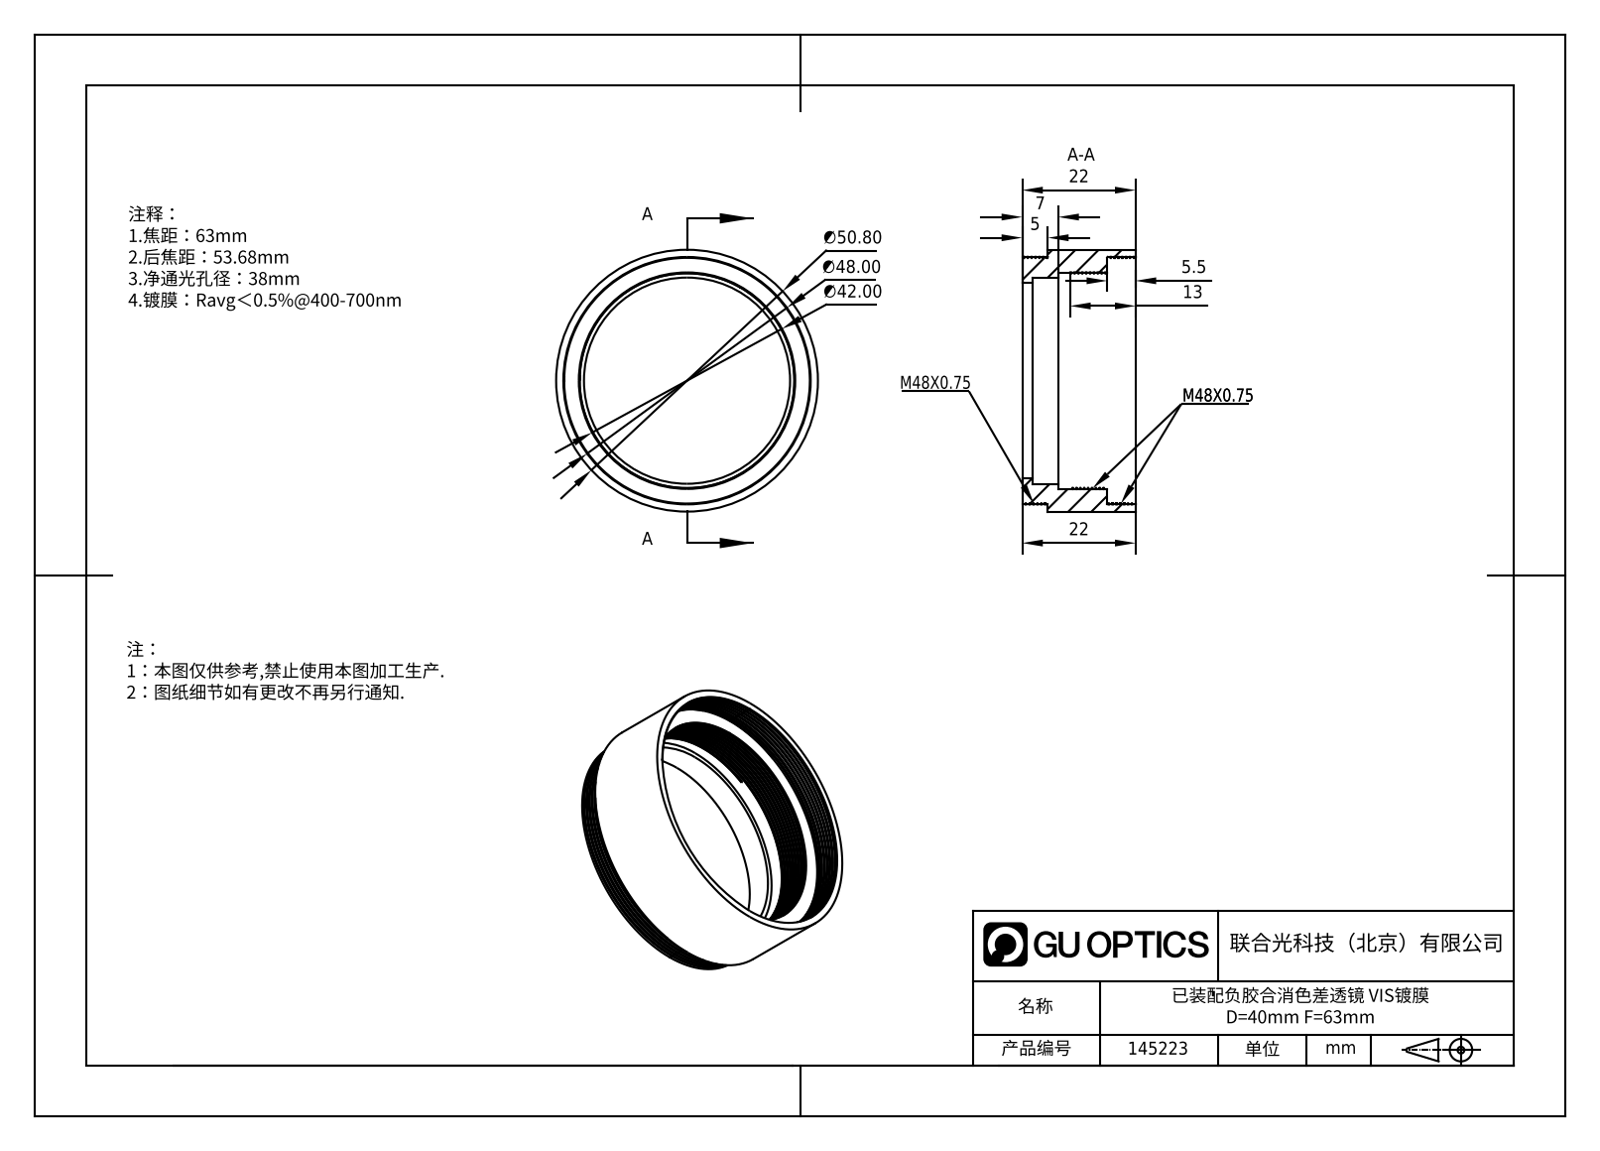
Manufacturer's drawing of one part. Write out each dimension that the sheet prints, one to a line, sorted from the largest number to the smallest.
∅50.80
∅48.00
∅42.00
22
22
13
7
5.5
5
